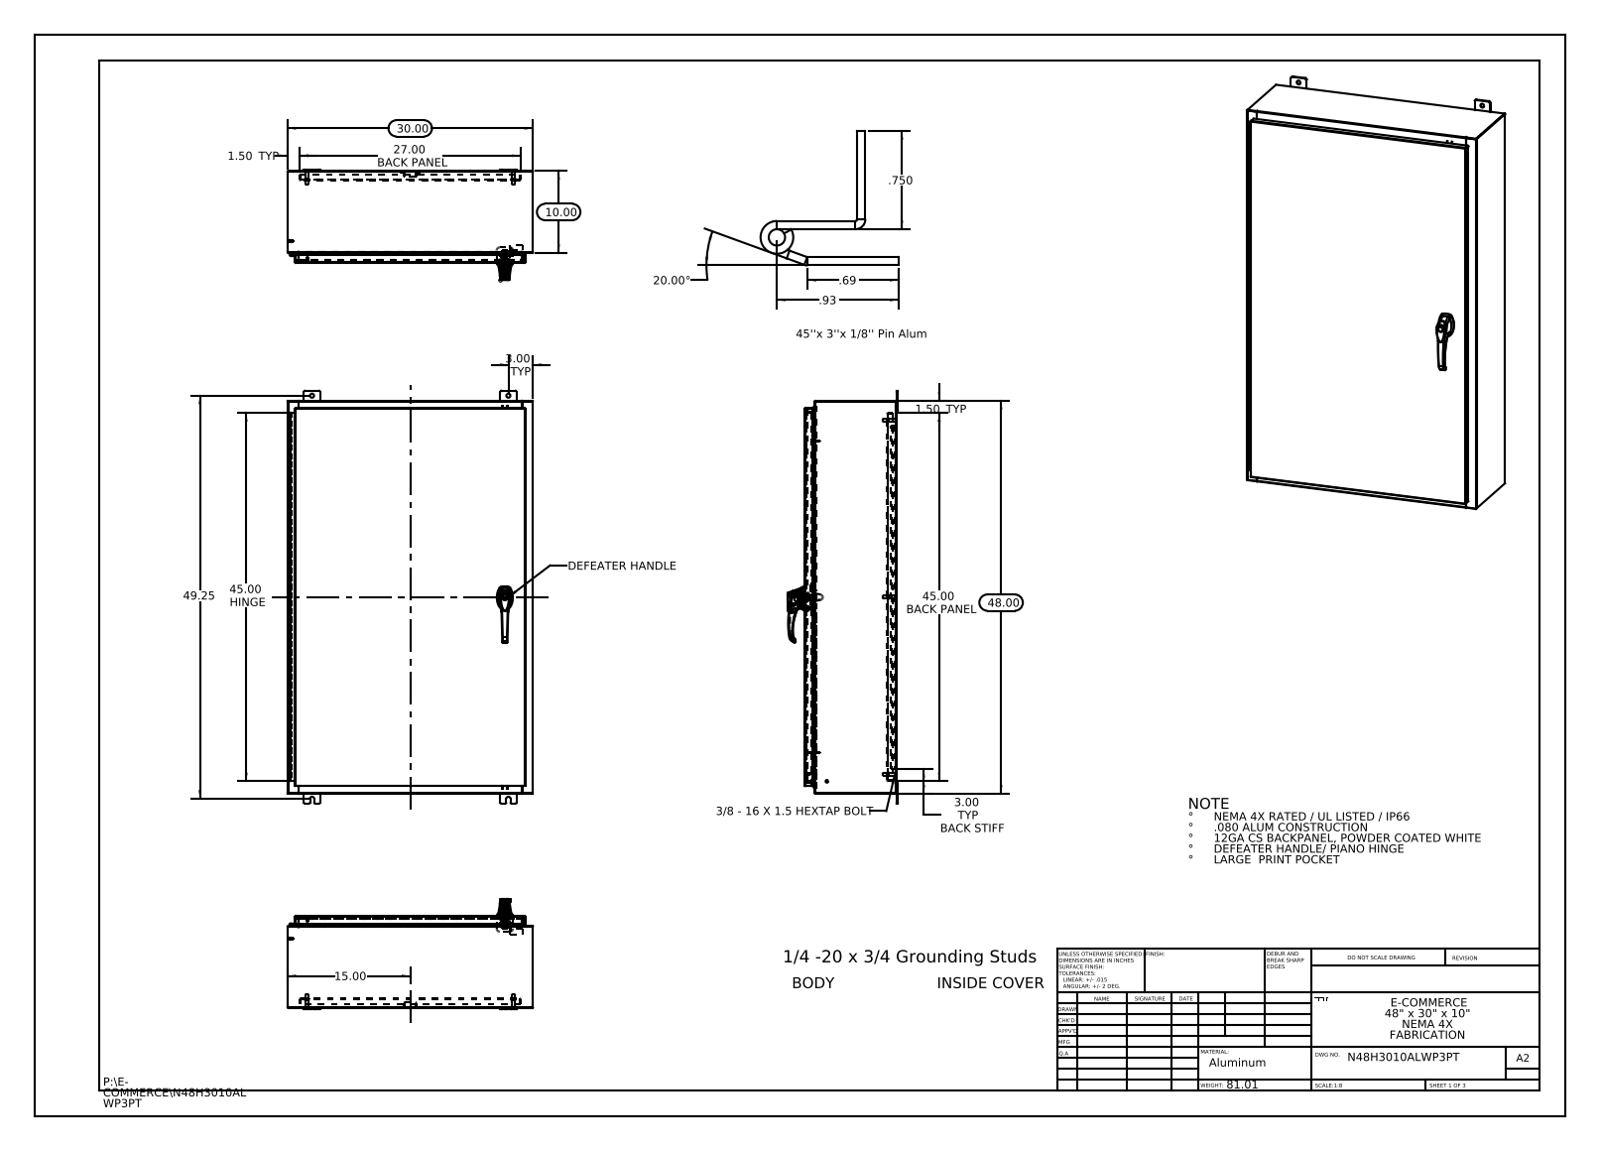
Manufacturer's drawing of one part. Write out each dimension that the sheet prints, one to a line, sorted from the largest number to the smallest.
49.25
48.00
45.00 HINGE
45.00 BACK PANEL
30.00
27.00 BACK PANEL
20.00°
15.00
10.00
3.00 TYP
3.00 TYP BACK STIFF
1.50 TYP
1.50 TYP
.93
.750
.69
